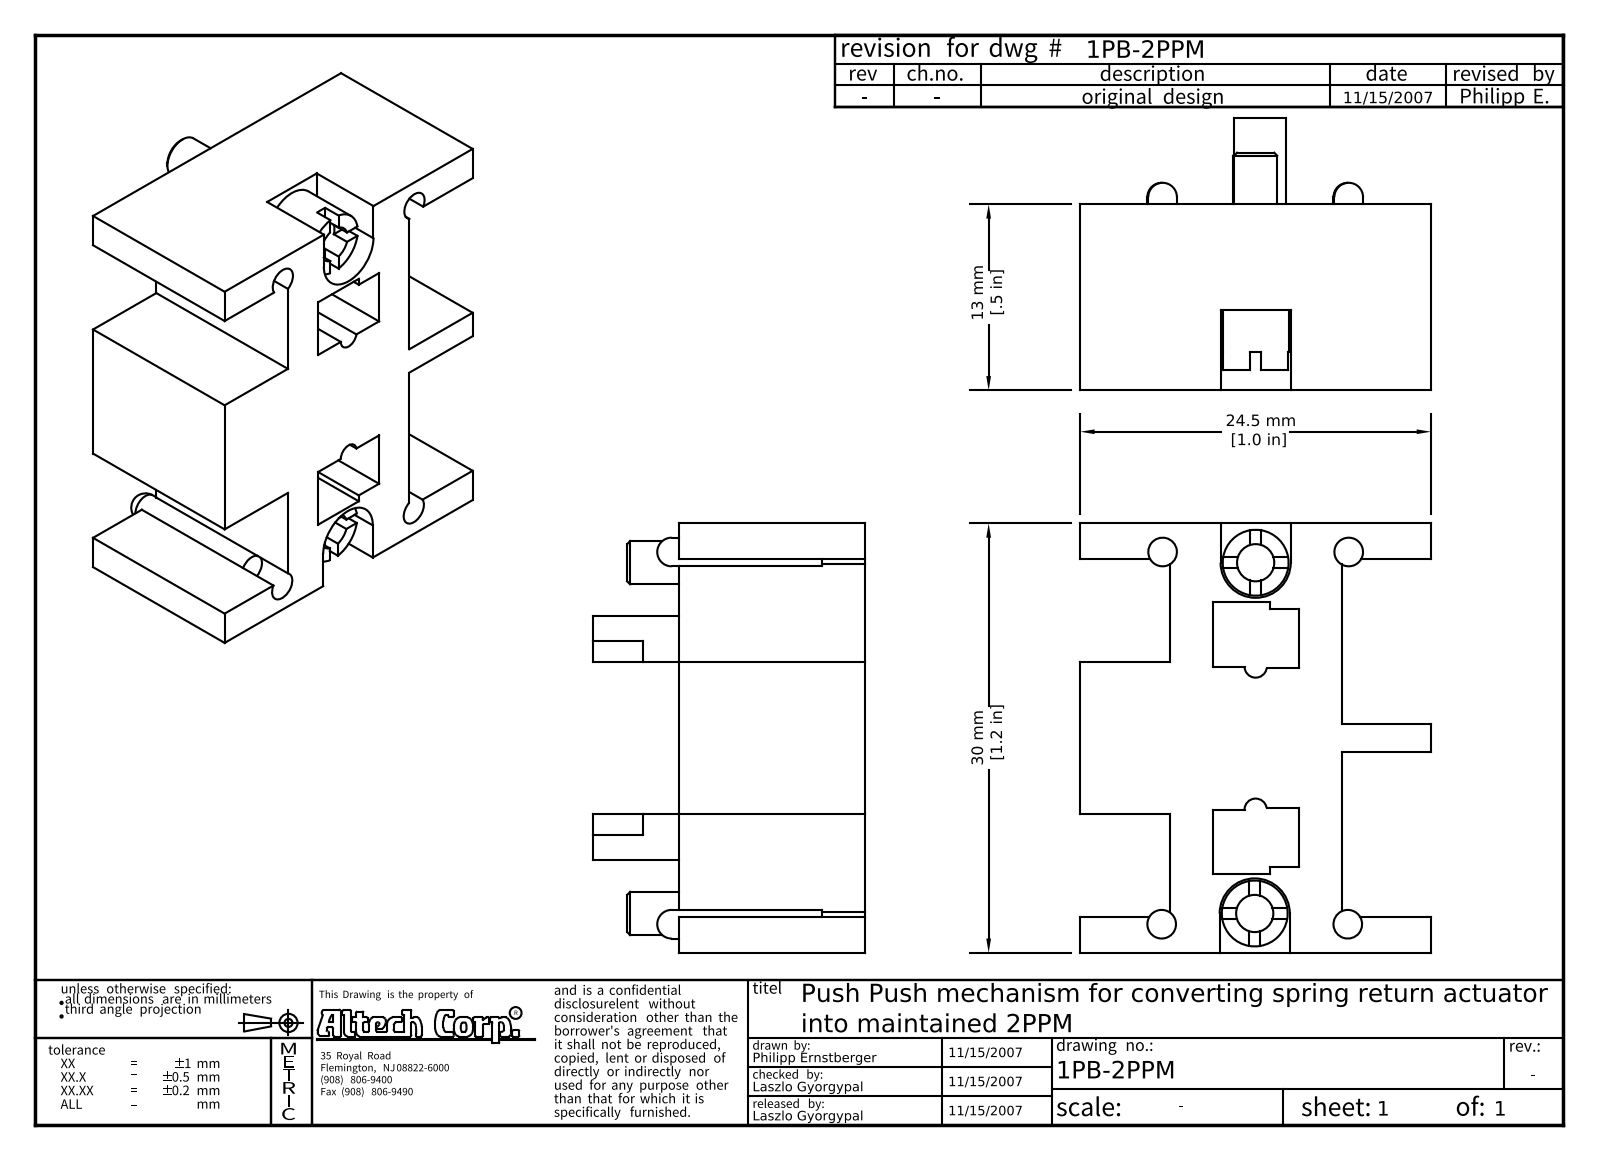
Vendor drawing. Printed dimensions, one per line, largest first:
30 mm [1.2 in]
24.5 mm [1.0 in]
13 mm [.5 in]
